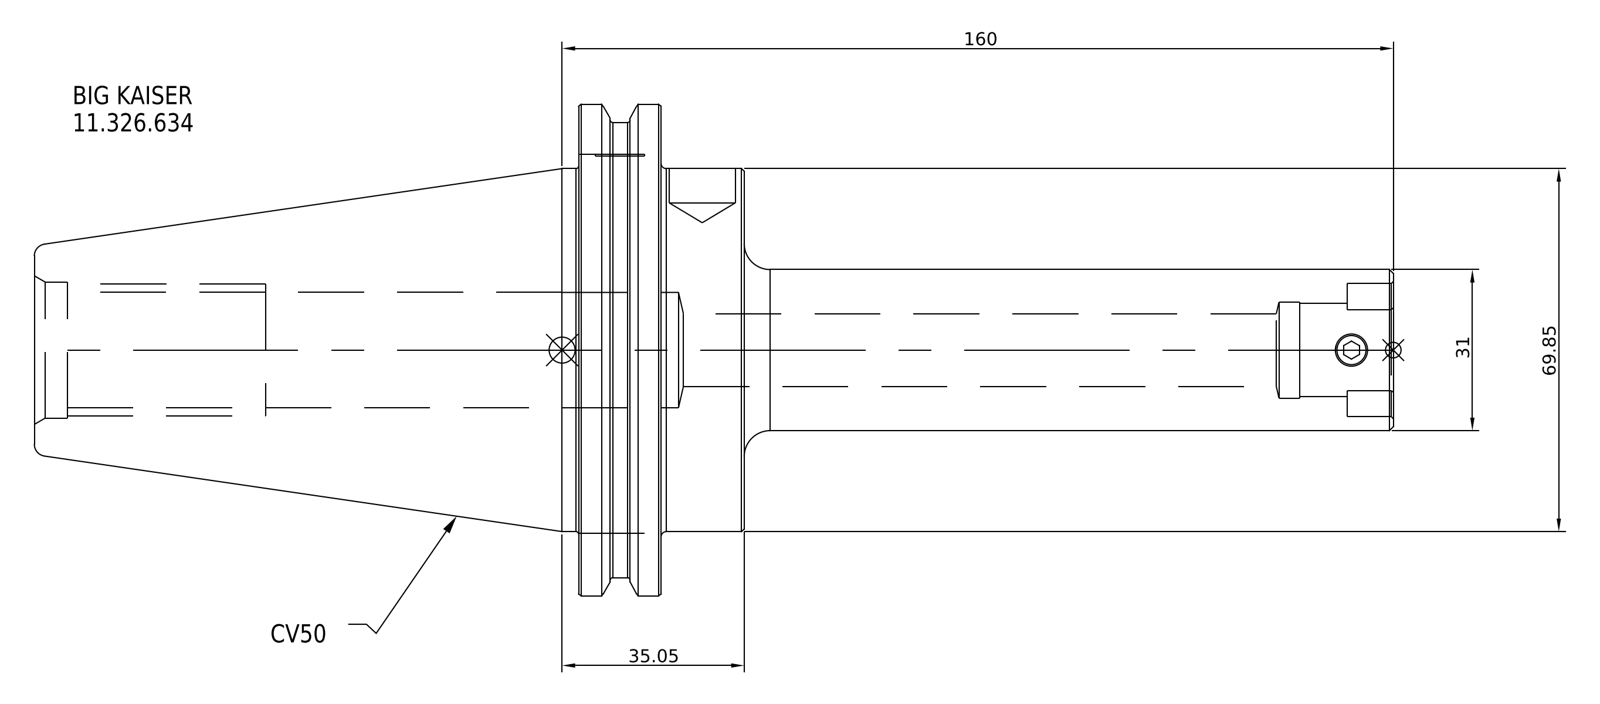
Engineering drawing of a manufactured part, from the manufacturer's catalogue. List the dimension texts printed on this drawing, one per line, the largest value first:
160
69.85
35.05
31
